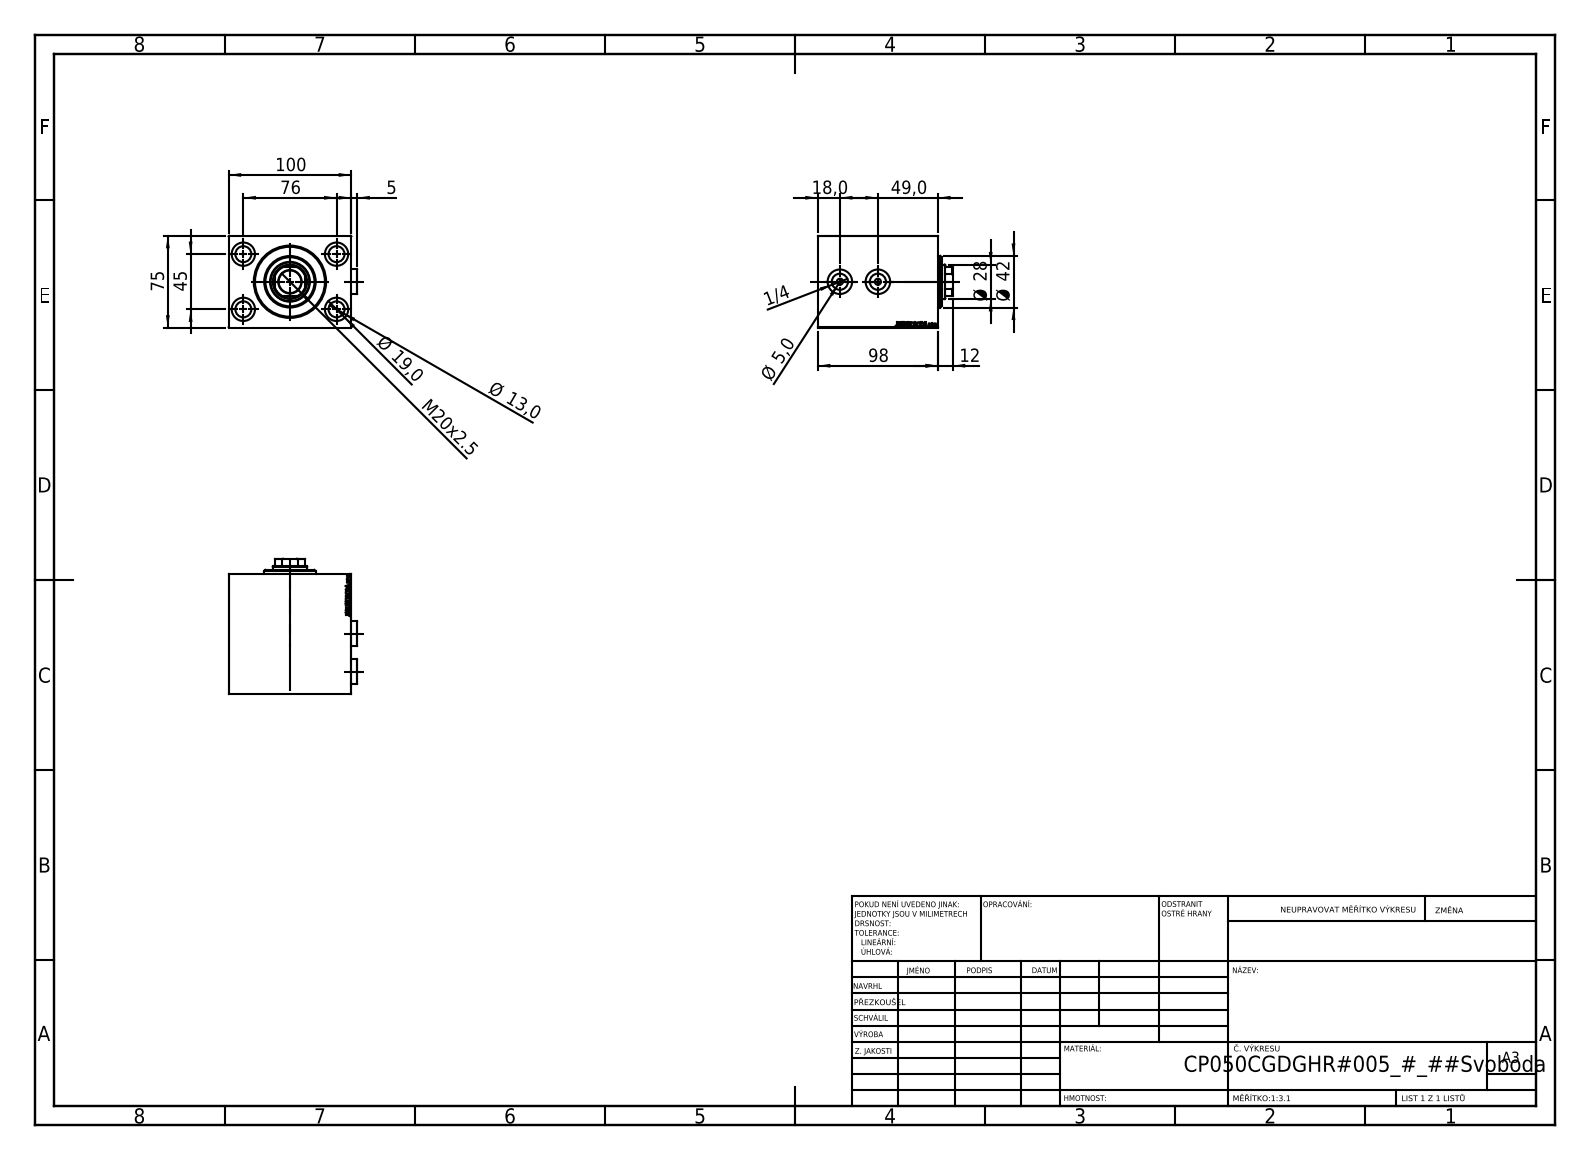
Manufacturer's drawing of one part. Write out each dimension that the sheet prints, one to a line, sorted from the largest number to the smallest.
100
98
76
75
49,0
45
Ø 42
Ø 28
M20x2.5
Ø 19,0
18,0
Ø 13,0
12
5
Ø 5,0
1/4
